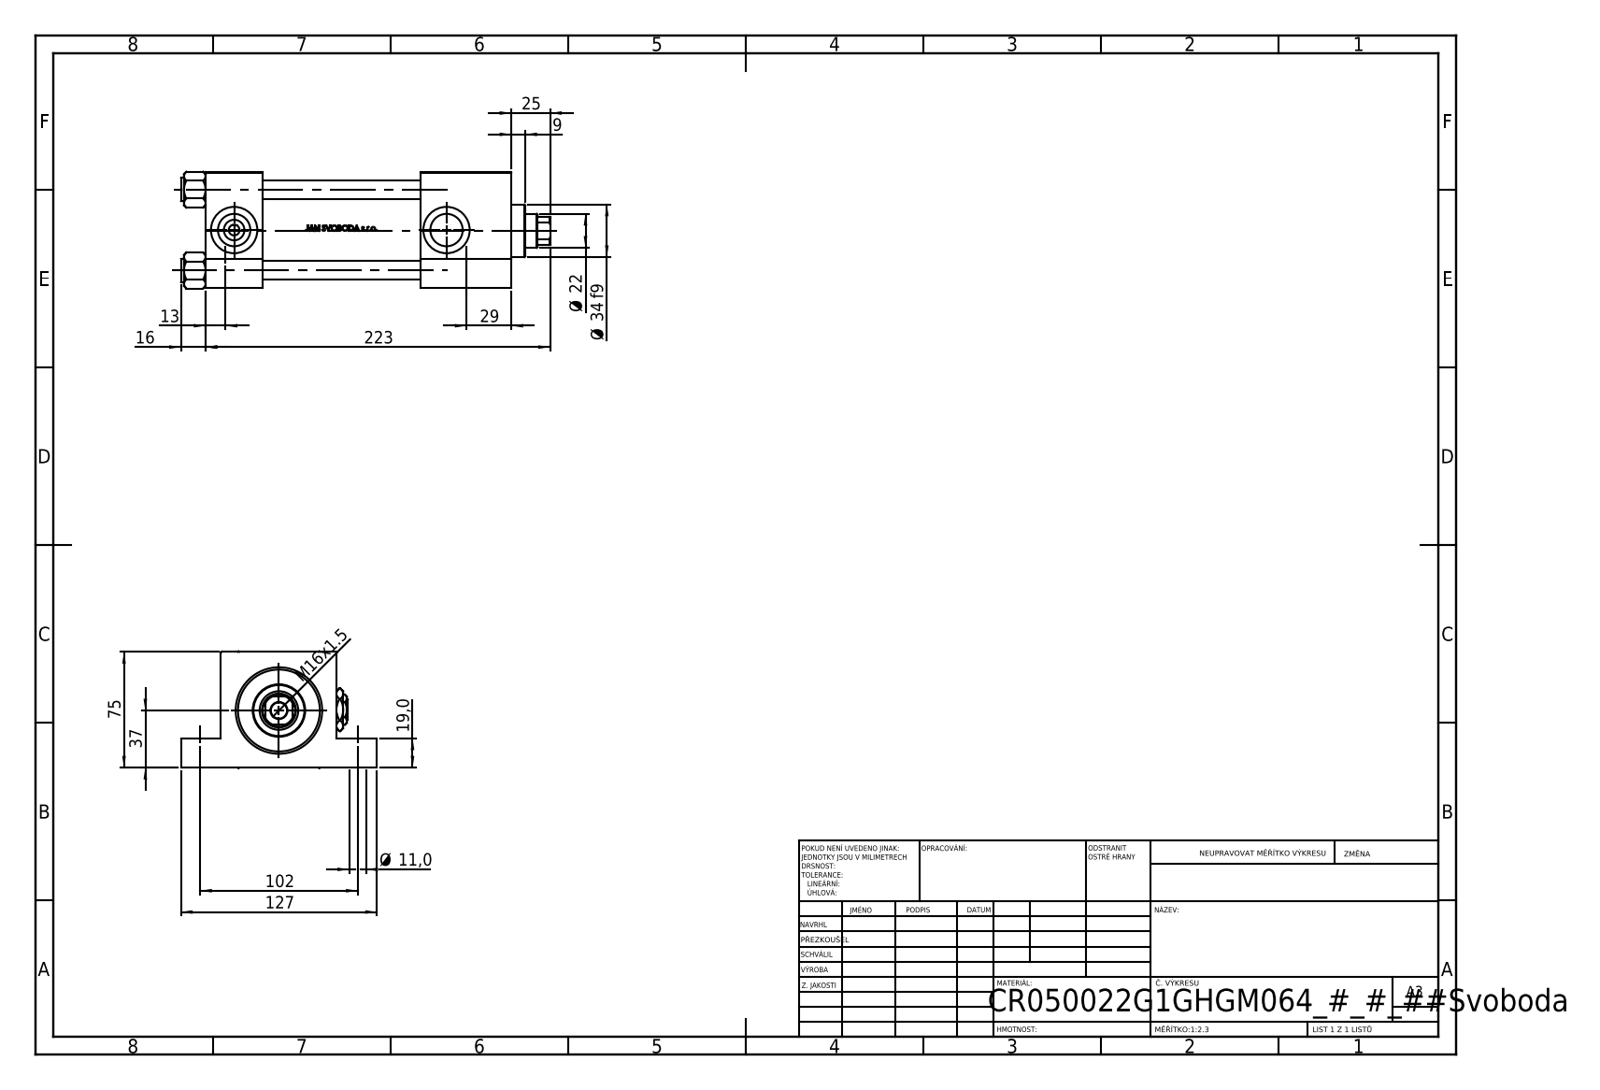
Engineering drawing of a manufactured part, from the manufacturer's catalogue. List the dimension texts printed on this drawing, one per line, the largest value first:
223
127
102
75
37
Ø 34 f9
29
25
Ø 22
19,0
16
M16x1.5
13
Ø 11,0
9
